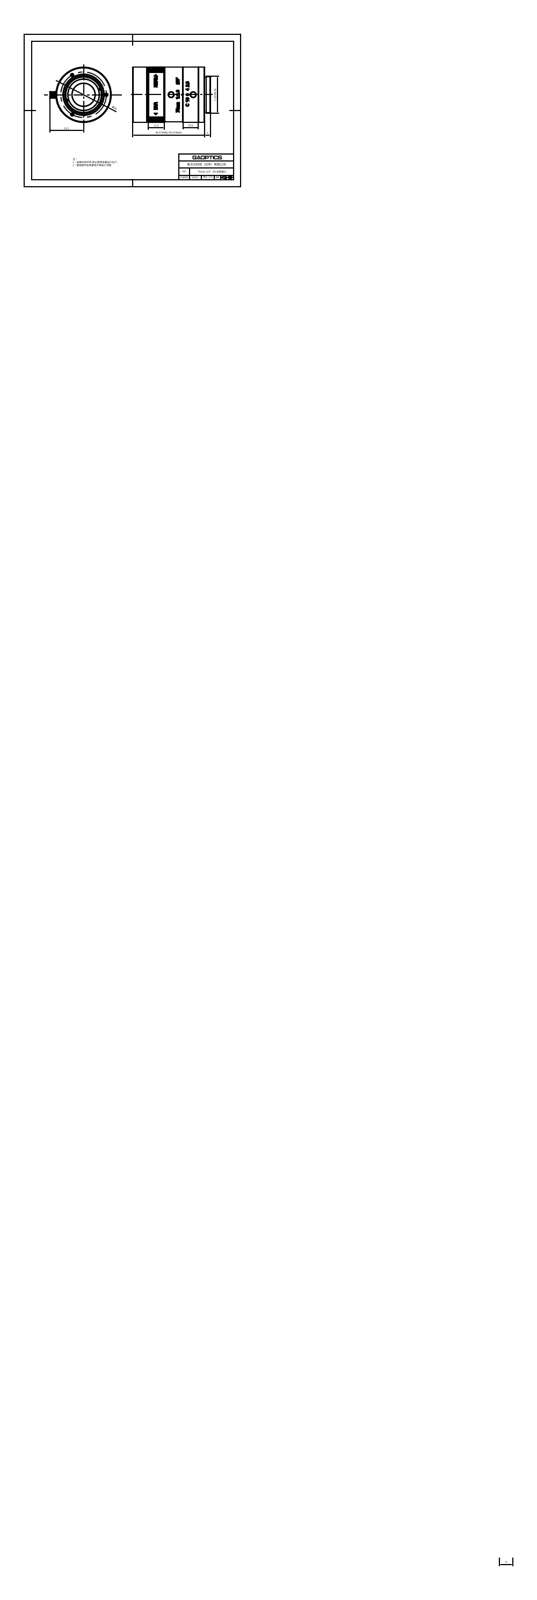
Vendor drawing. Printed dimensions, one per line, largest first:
49.57(MIN)-56.47(MAX)
∅38
23.2
11.3
10.5
9
4
1-32UN-2A
